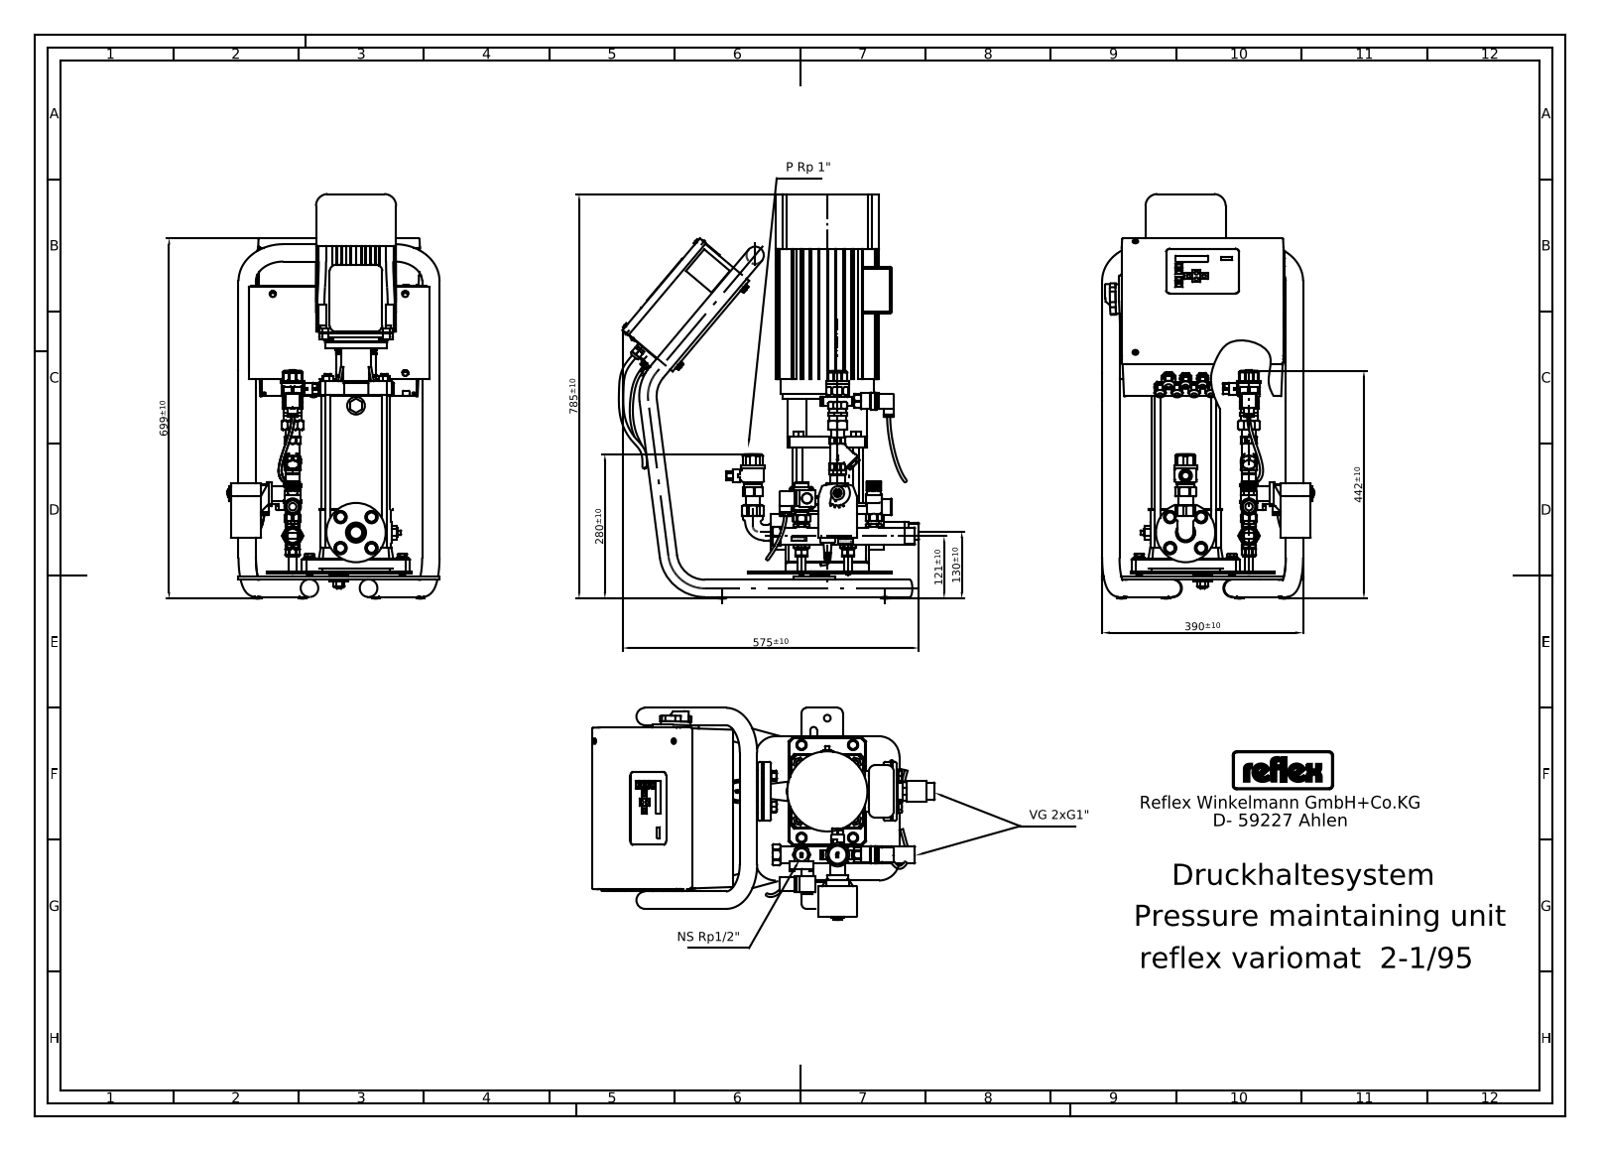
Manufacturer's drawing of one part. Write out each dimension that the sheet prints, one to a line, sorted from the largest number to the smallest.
785±10
699±10
575±10
442±10
390±10
280±10
130±10
121±10
